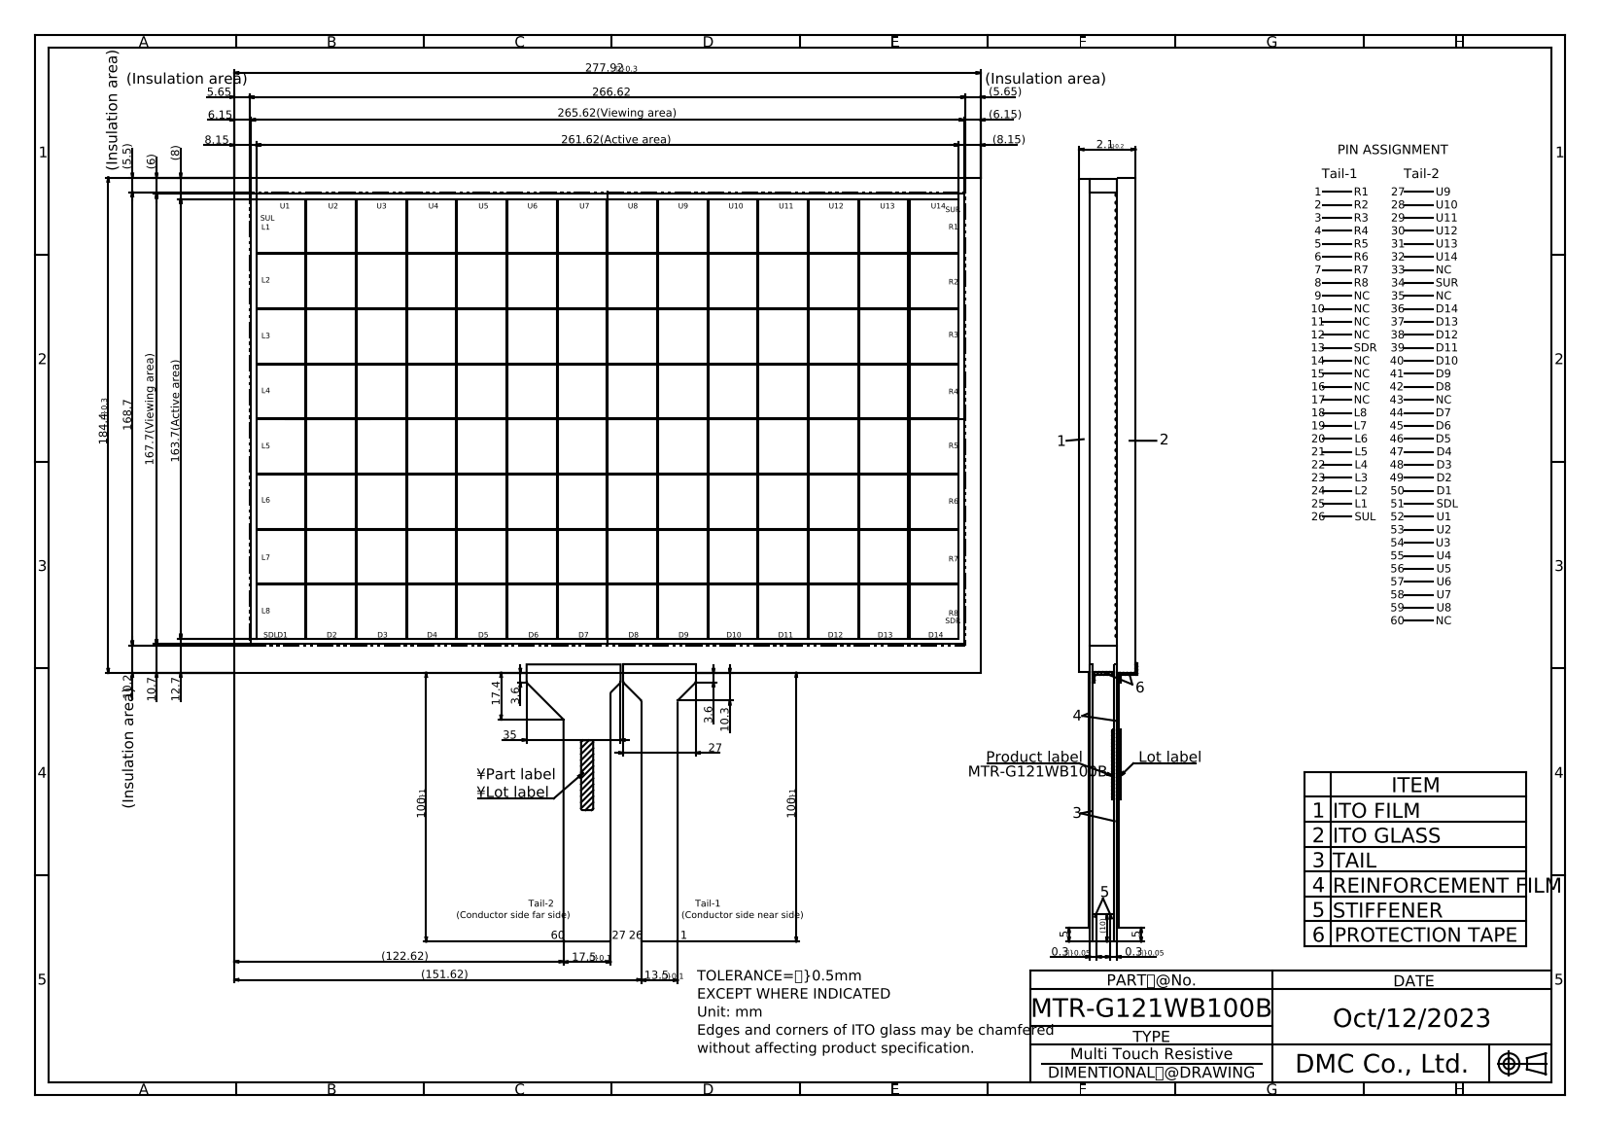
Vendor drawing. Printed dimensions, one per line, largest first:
277.92
266.62
265.62(Viewing area)
261.62(Active area)
184.40
168.7
167.7(Viewing area)
163.7(Active area)
(151.62)
(122.62)
100.00
100.00
35
27
17.50
17.4
13.50
12.7
10.7
10.3
10.2
(10)
(8.15)
8.15
(8)
(6.15)
6.15
(6)
(5.65)
5.65
(5.5)
5
5
3.6
3.6
2.1{\H0.5x;?}0.2}
0.3{\H0.66667x;?}0.05}
0.3{\H0.66667x;?}0.05}
